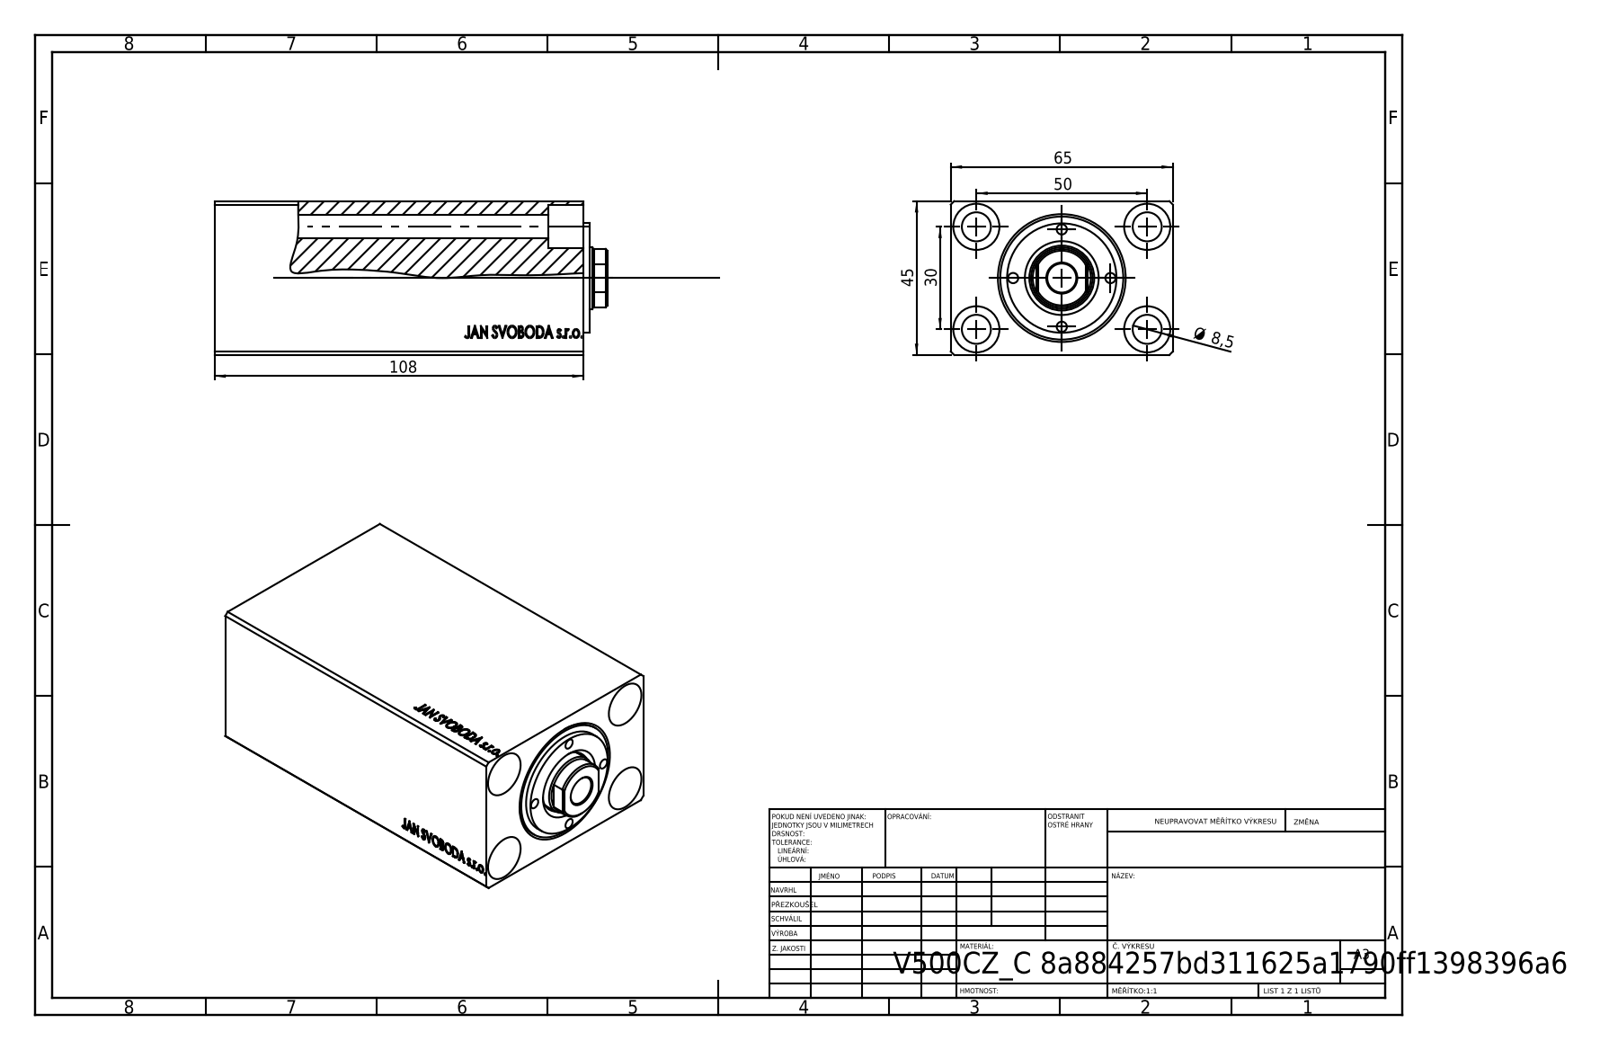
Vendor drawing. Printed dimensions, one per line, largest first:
108
65
50
45
30
Ø 8,5
